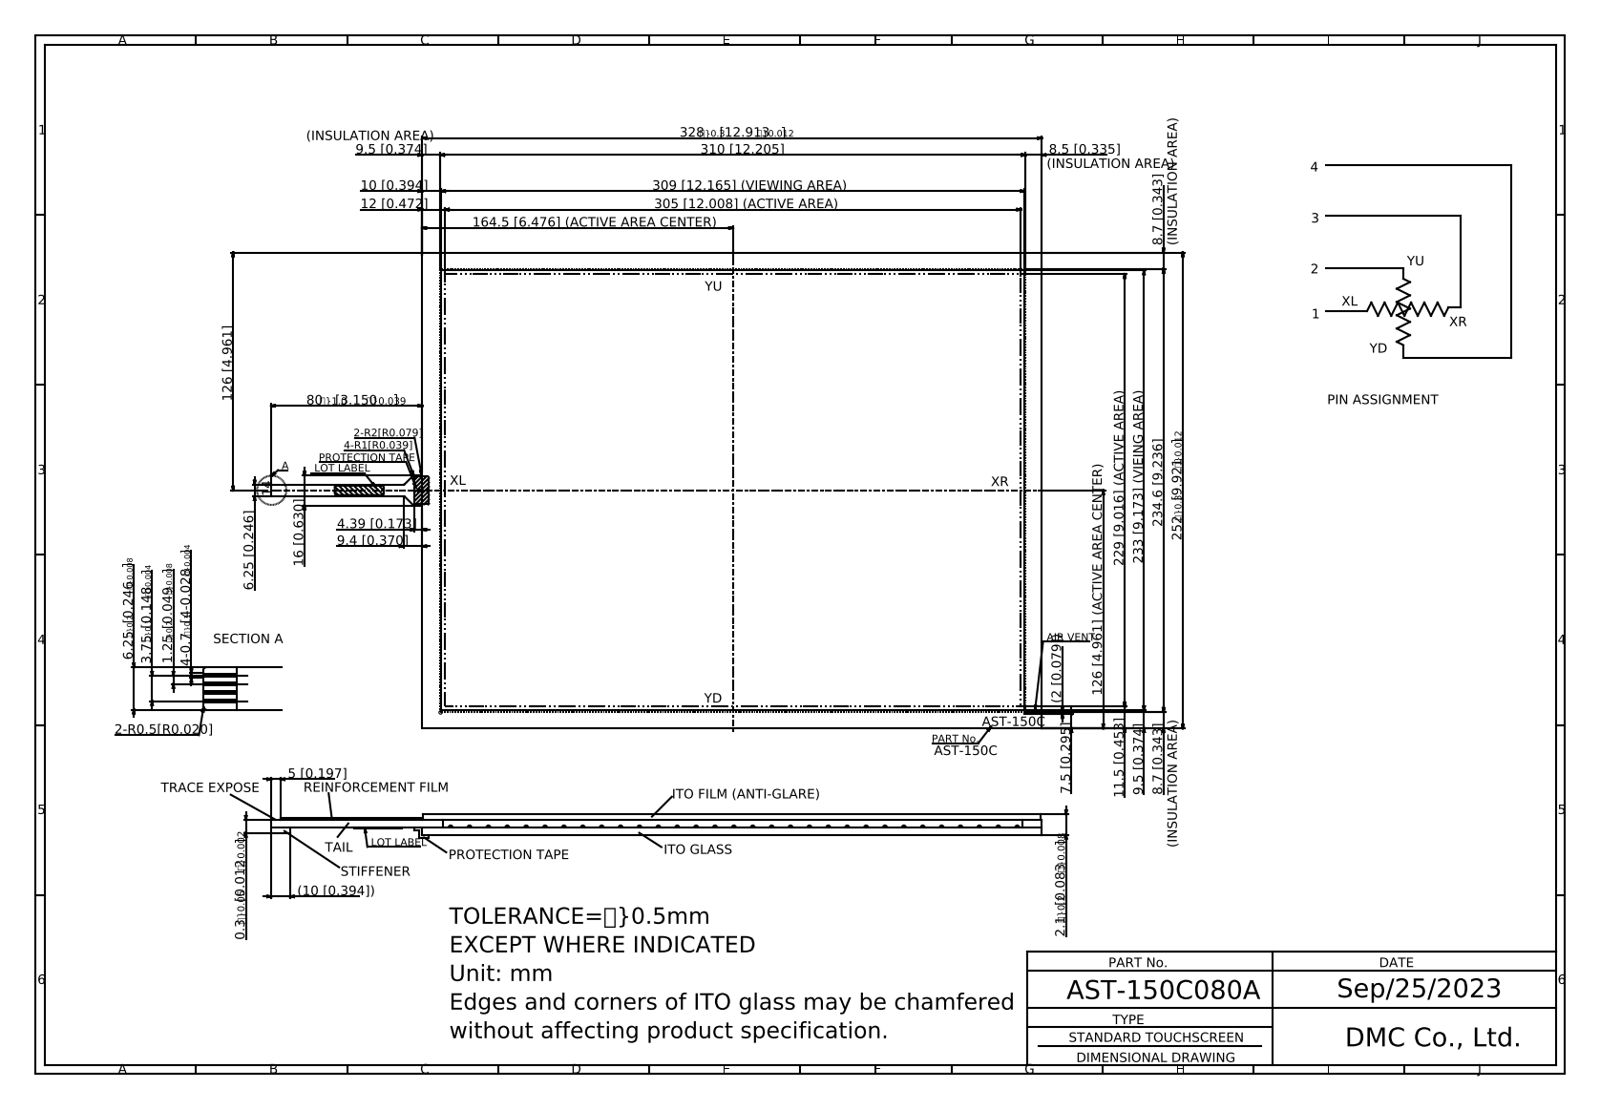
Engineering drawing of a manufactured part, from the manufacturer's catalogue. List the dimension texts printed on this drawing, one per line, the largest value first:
328.00
310 [12.205]
309 [12.165] (VIEWING AREA)
305 [12.008] (ACTIVE AREA)
252.00
234.6 [9.236]
233 [9.173] (VIEING AREA)
229 [9.016] (ACTIVE AREA)
164.5 [6.476] (ACTIVE AREA CENTER)
126 [4.961]
126 [4.961] (ACTIVE AREA CENTER)
80{\H0.75x;?}1.0}[3.150{\H0.75x;?}0.039}]
16 [0.630]
12 [0.472]
11.5 [0.453]
(10 [0.394])
10 [0.394]
9.5 [0.374]
9.5 [0.374]
9.4 [0.370]
8.7 [0.343]
8.7 [0.343]
8.5 [0.335]
7.5 [0.295]
6.25{\H0.6x;?}0.2}[0.246{\H0.6x;?}0.008}]
6.25 [0.246]
5 [0.197]
4.39 [0.173]
4-0.7{\H0.6x;?}0.1}[4-0.028{\H0.6x;?}0.004}]
3.75{\H0.6x;?}0.1}[0.148{\H0.6x;?}0.004}]
2.1{\H0.75x;?}0.2}[0.083{\H0.75x;?}0.008}]
(2 [0.079])
1.25{\H0.6x;?}0.2}[0.049{\H0.6x;?}0.008}]
0.3{\H0.75x;?}0.05}[0.012{\H0.75x;?}0.002}]
